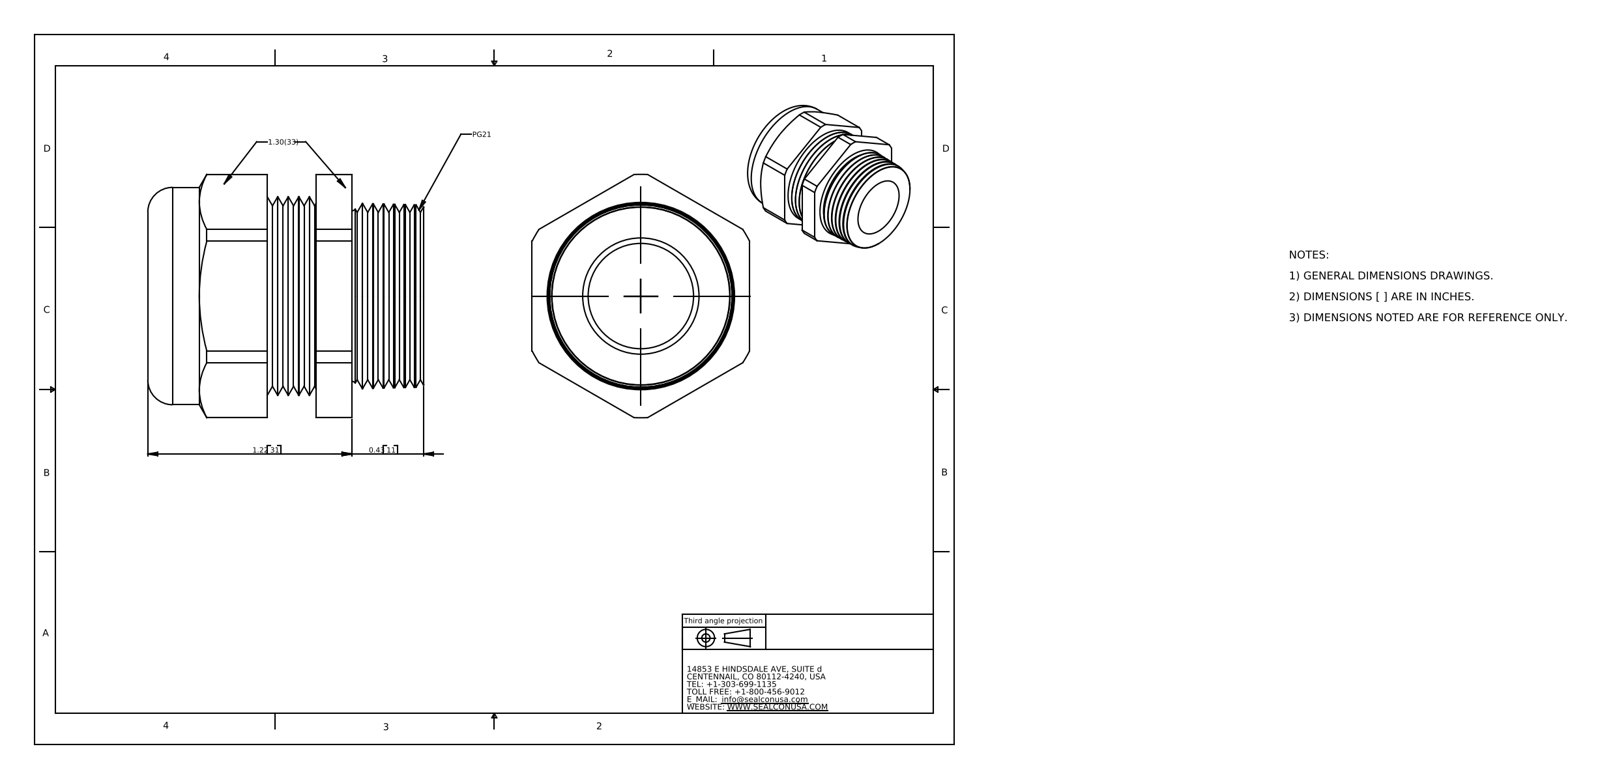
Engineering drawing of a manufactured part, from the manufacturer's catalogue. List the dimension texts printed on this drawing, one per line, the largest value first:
1.22 31
0.43 11
